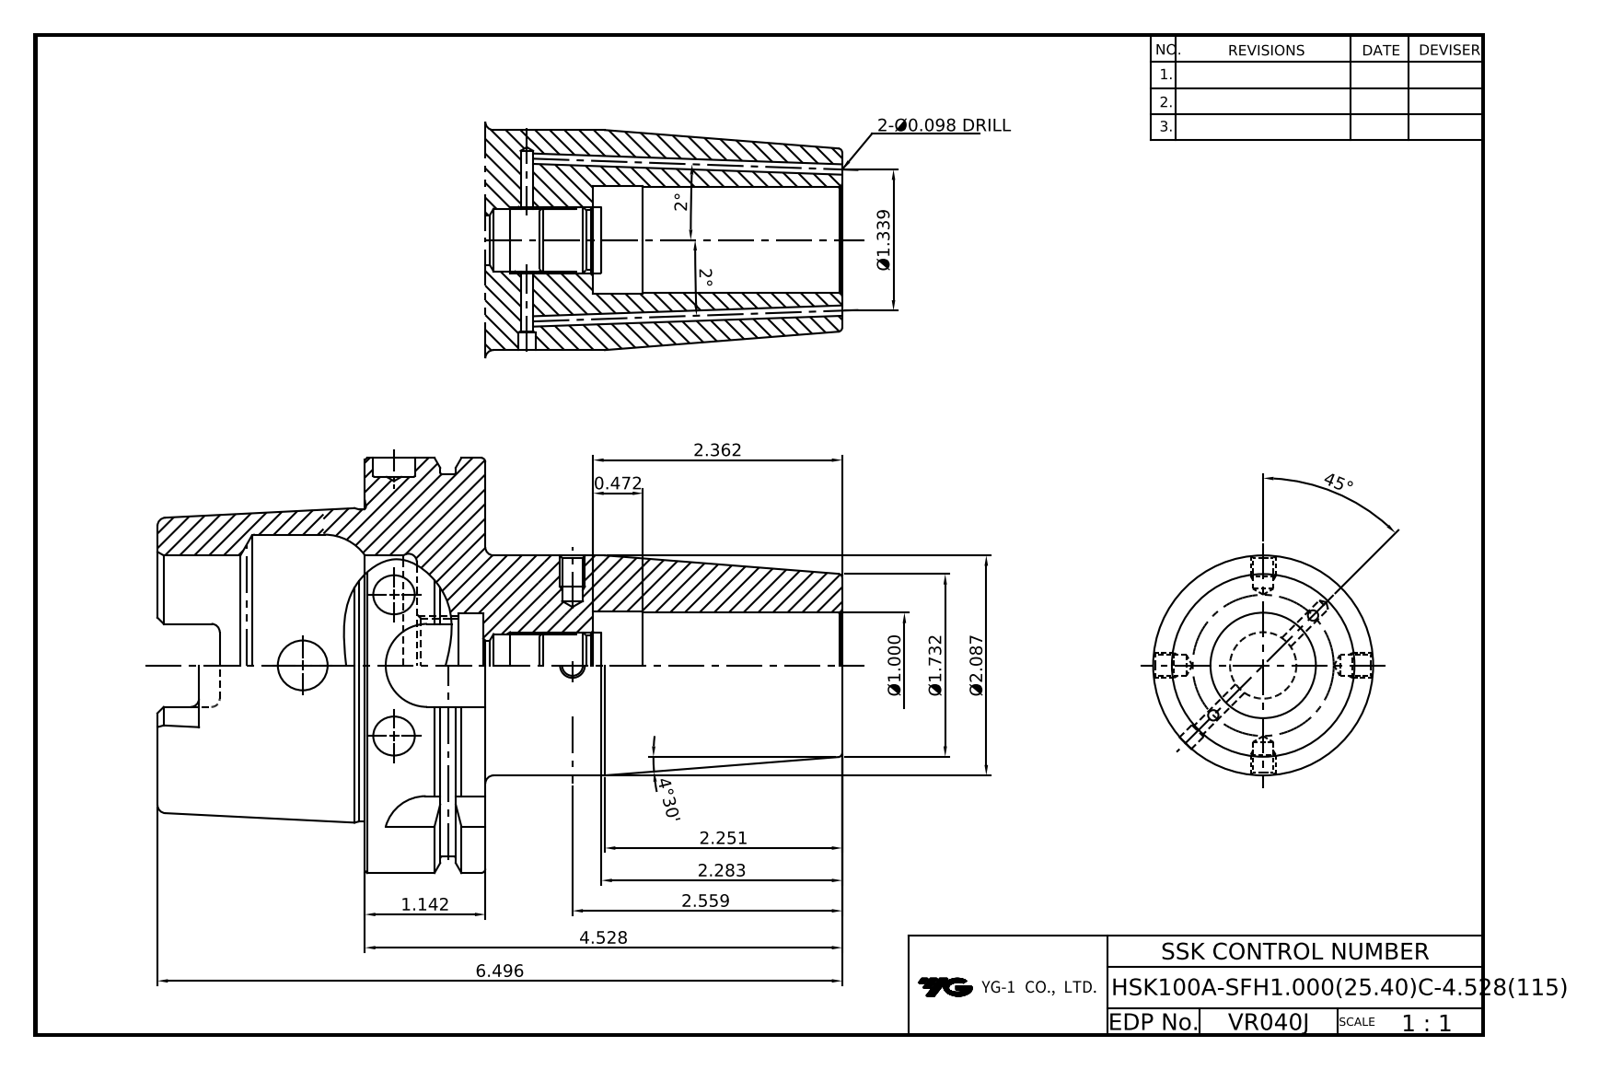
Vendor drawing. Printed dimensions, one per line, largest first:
45°
6.496
4.528
4°30'
2.559
2.362
2.283
2.251
Ø2.087
2°
2°
Ø1.732
Ø1.339
1.142
0.472
